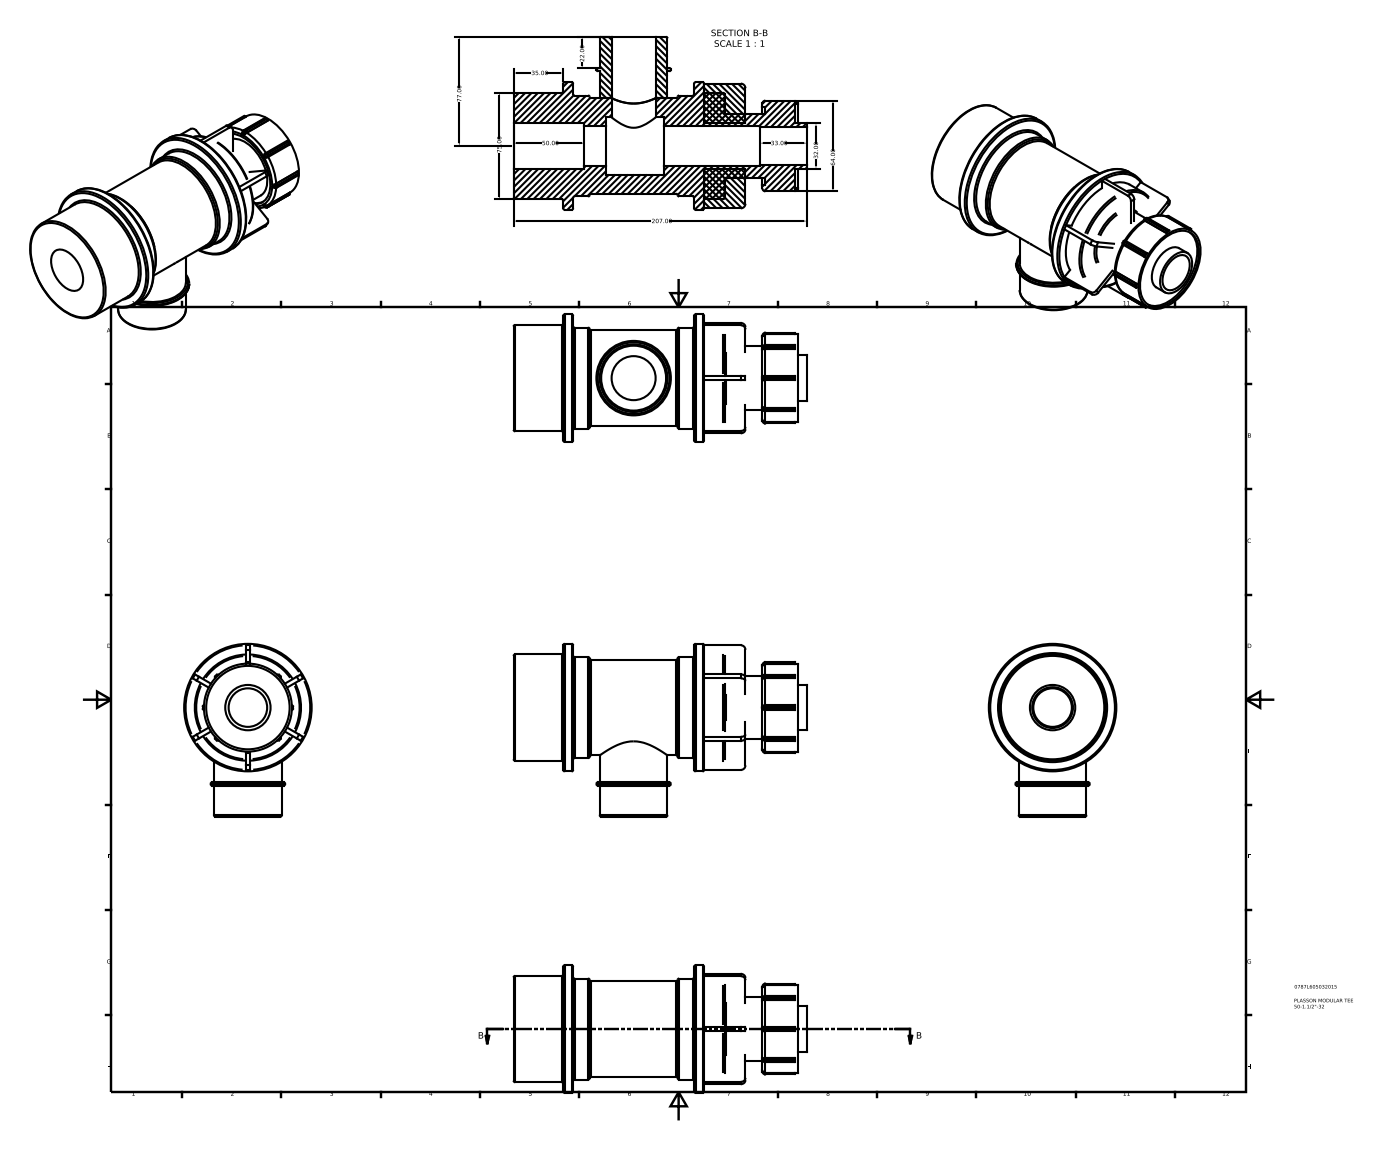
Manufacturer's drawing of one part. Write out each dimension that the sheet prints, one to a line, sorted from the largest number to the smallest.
207.00
77.00
75.00
64.00
50.00
35.00
33.00
32.00
22.00
